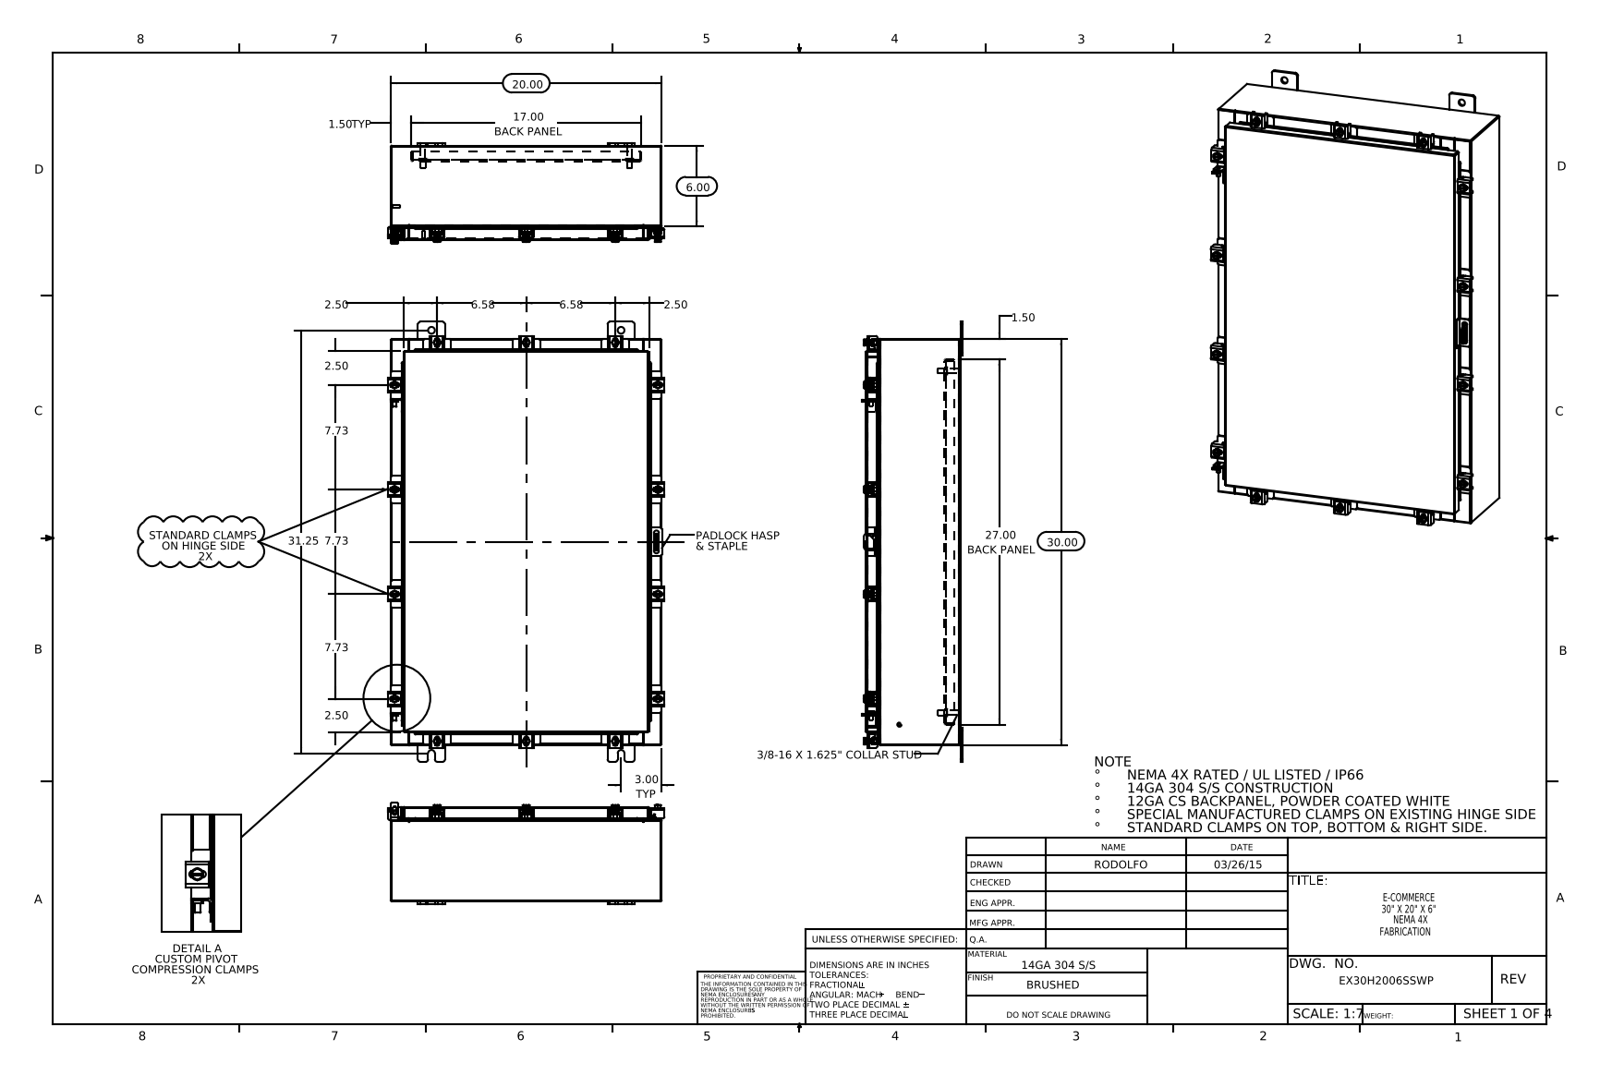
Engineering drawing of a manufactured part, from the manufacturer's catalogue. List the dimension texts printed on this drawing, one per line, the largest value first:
31.25
30.00
27.00 BACK PANEL
20.00
17.00 BACK PANEL
7.73
7.73
7.73
6.58
6.58
6.00
3.00 TYP
2.50
2.50
2.50
2.50
1.50 TYP
1.50
